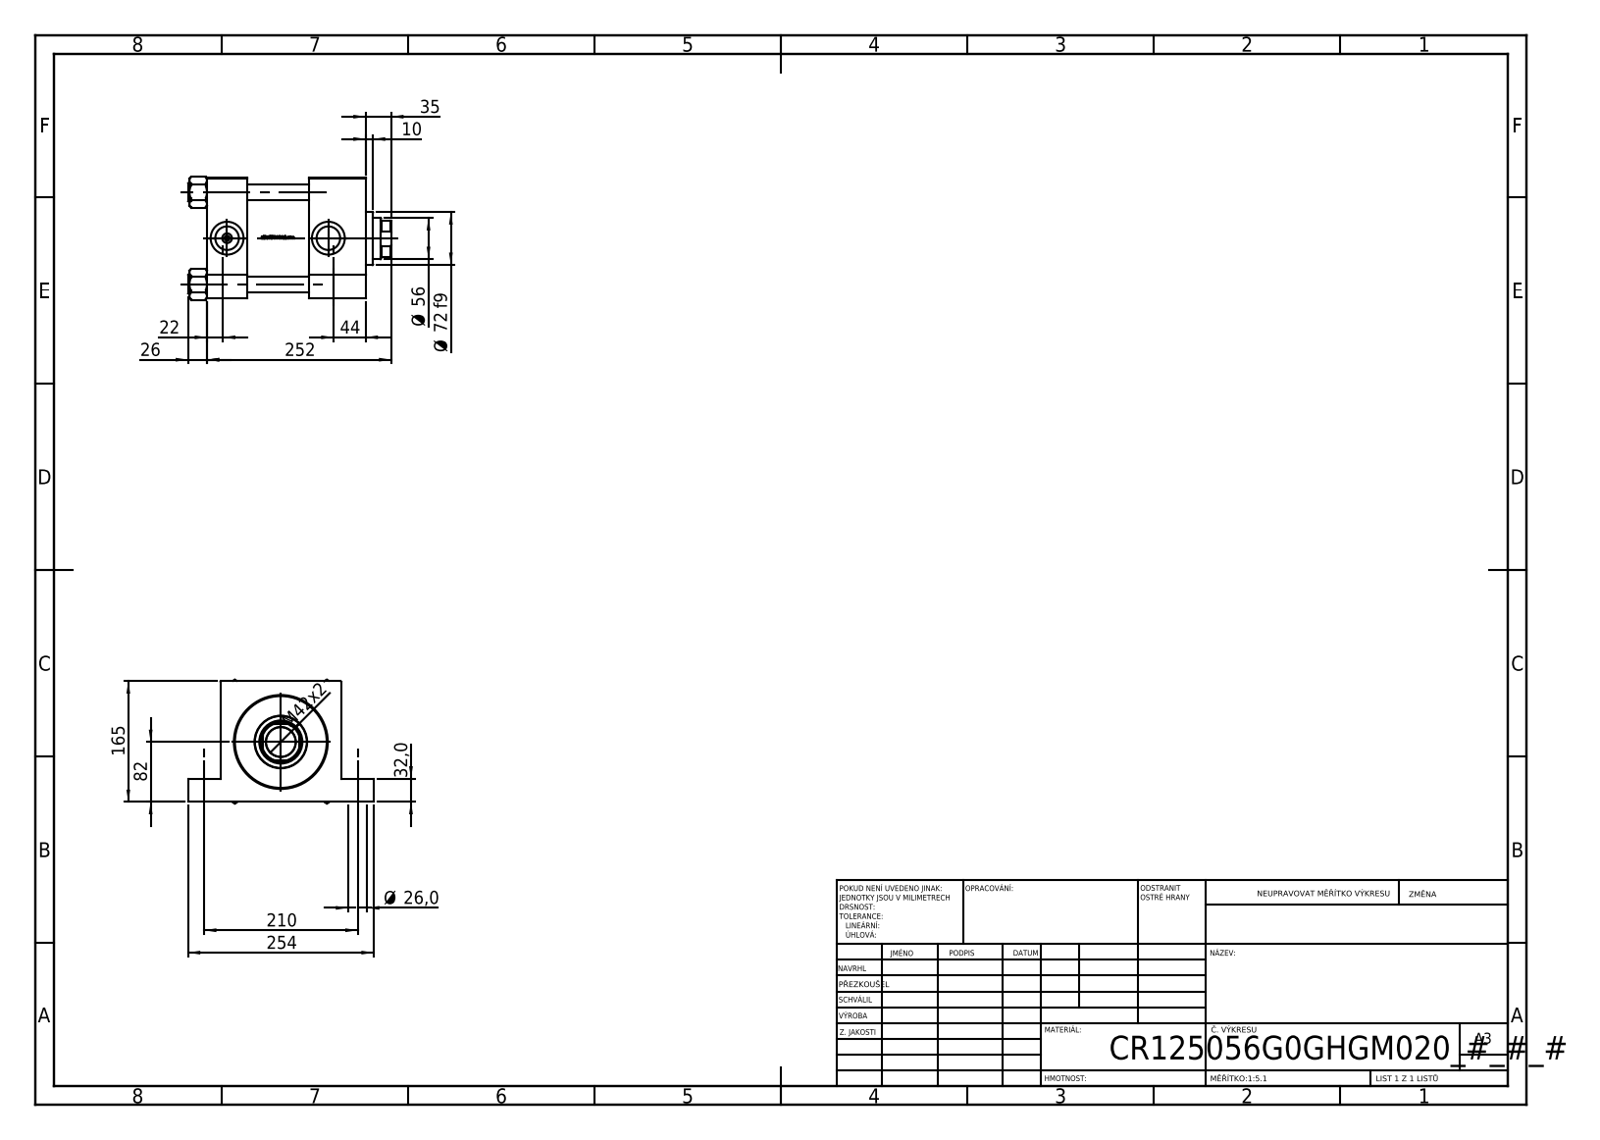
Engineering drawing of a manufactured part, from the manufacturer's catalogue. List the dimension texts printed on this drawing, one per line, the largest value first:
254
252
210
165
82
Ø 72 f9
Ø 56
44
M42x2
35
32,0
26
Ø 26,0
22
10
